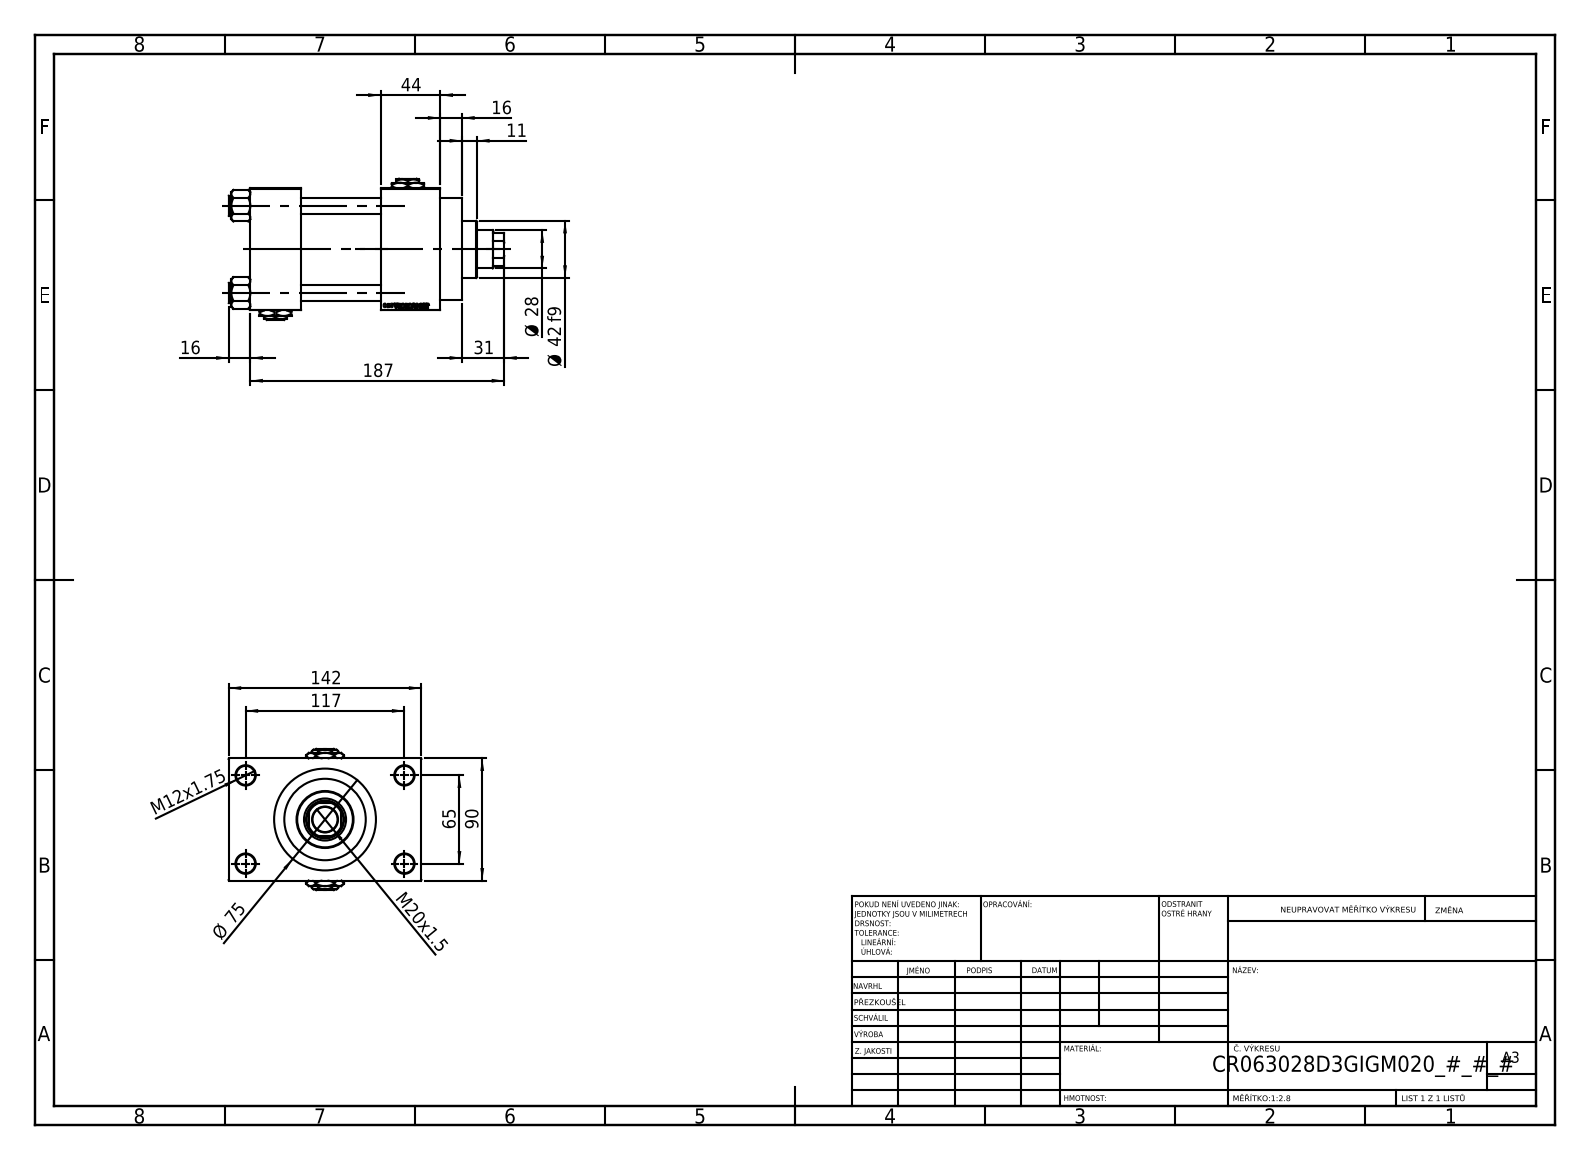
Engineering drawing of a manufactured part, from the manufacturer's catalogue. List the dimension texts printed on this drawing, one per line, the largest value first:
187
142
117
90
Ø 75
65
44
Ø 42 f9
31
Ø 28
M20x1.5
16
16
M12x1.75
11
